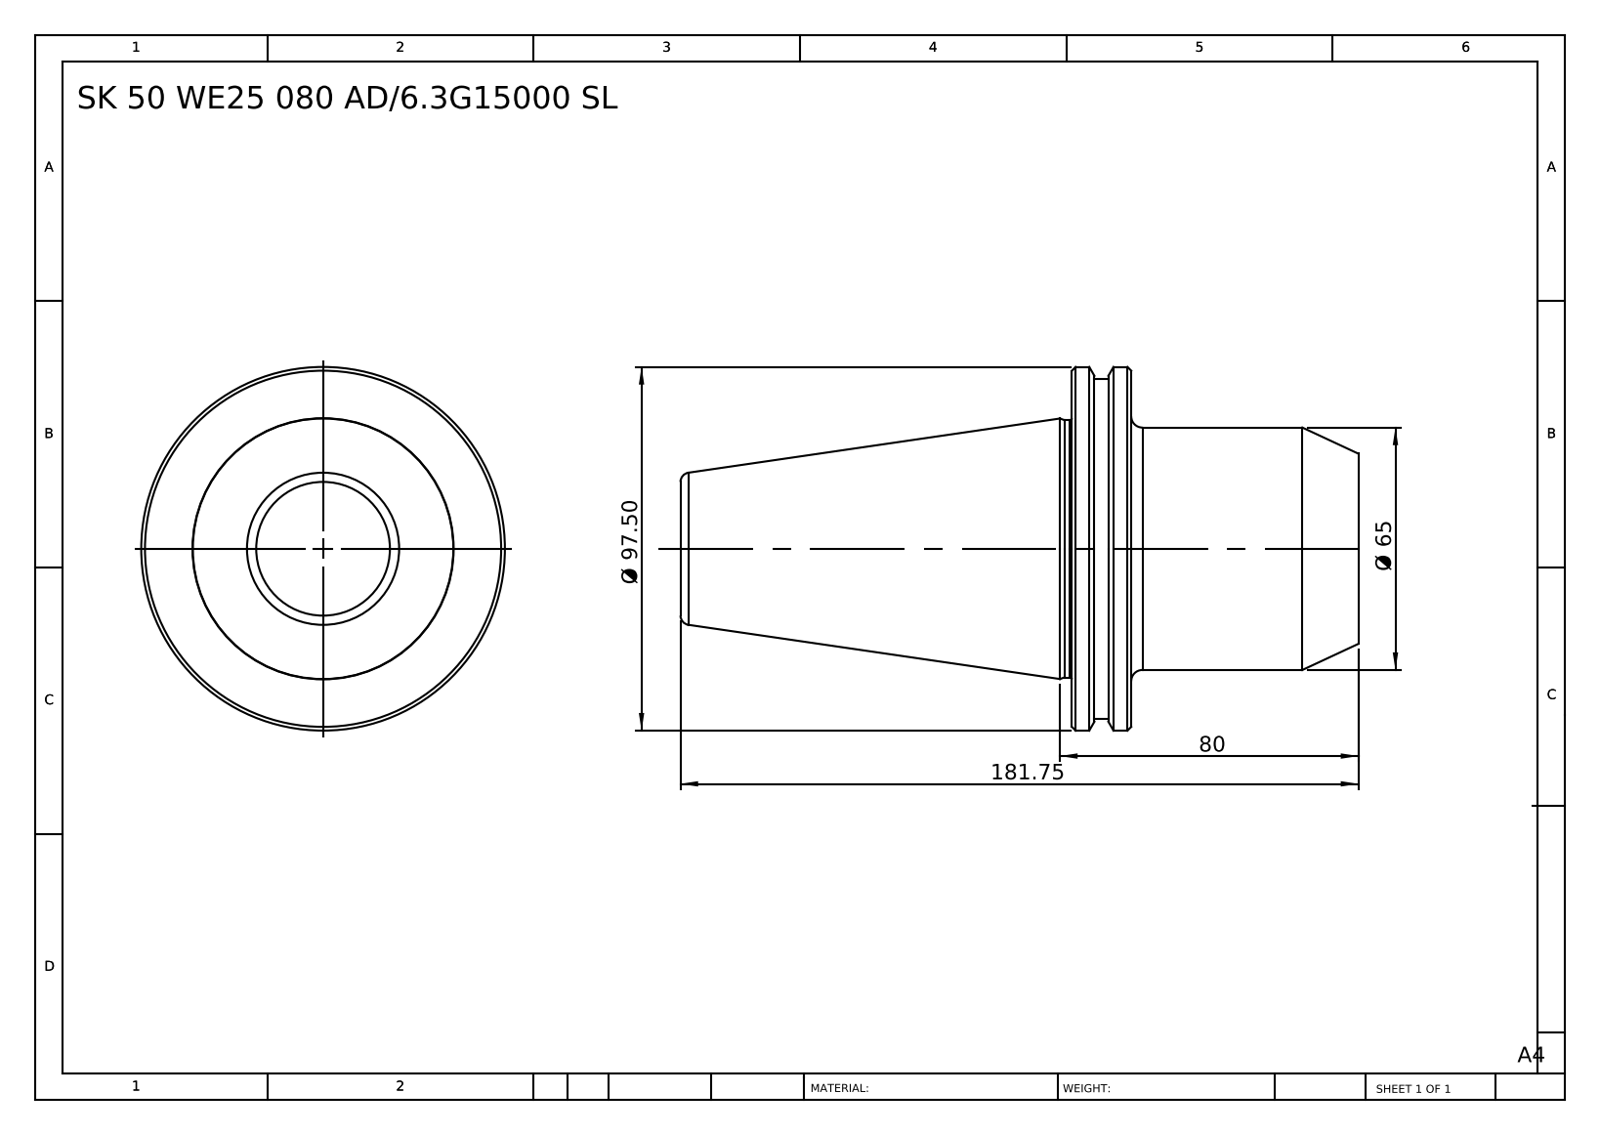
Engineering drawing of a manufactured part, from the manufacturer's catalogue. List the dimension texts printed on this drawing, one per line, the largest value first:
181.75
Ø 97.50
80
Ø 65
